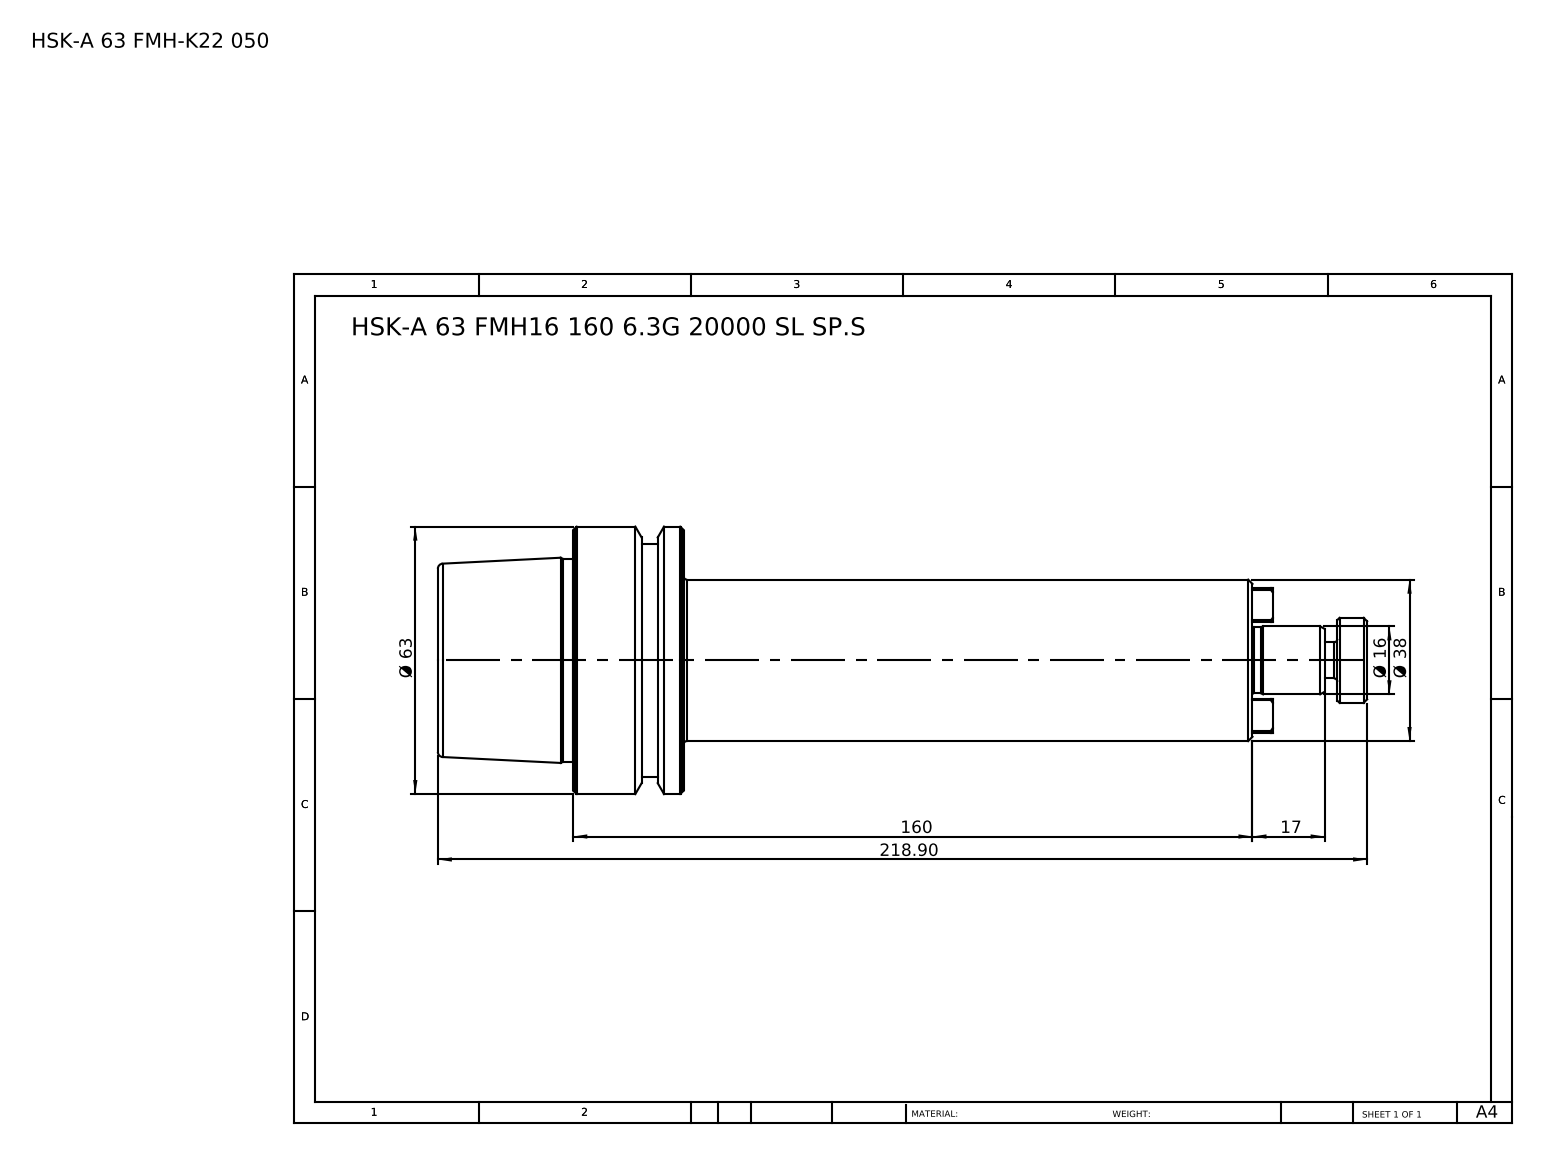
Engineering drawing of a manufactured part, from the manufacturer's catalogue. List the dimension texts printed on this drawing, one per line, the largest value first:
218.90
160
Ø 63
Ø 38
17
Ø 16
